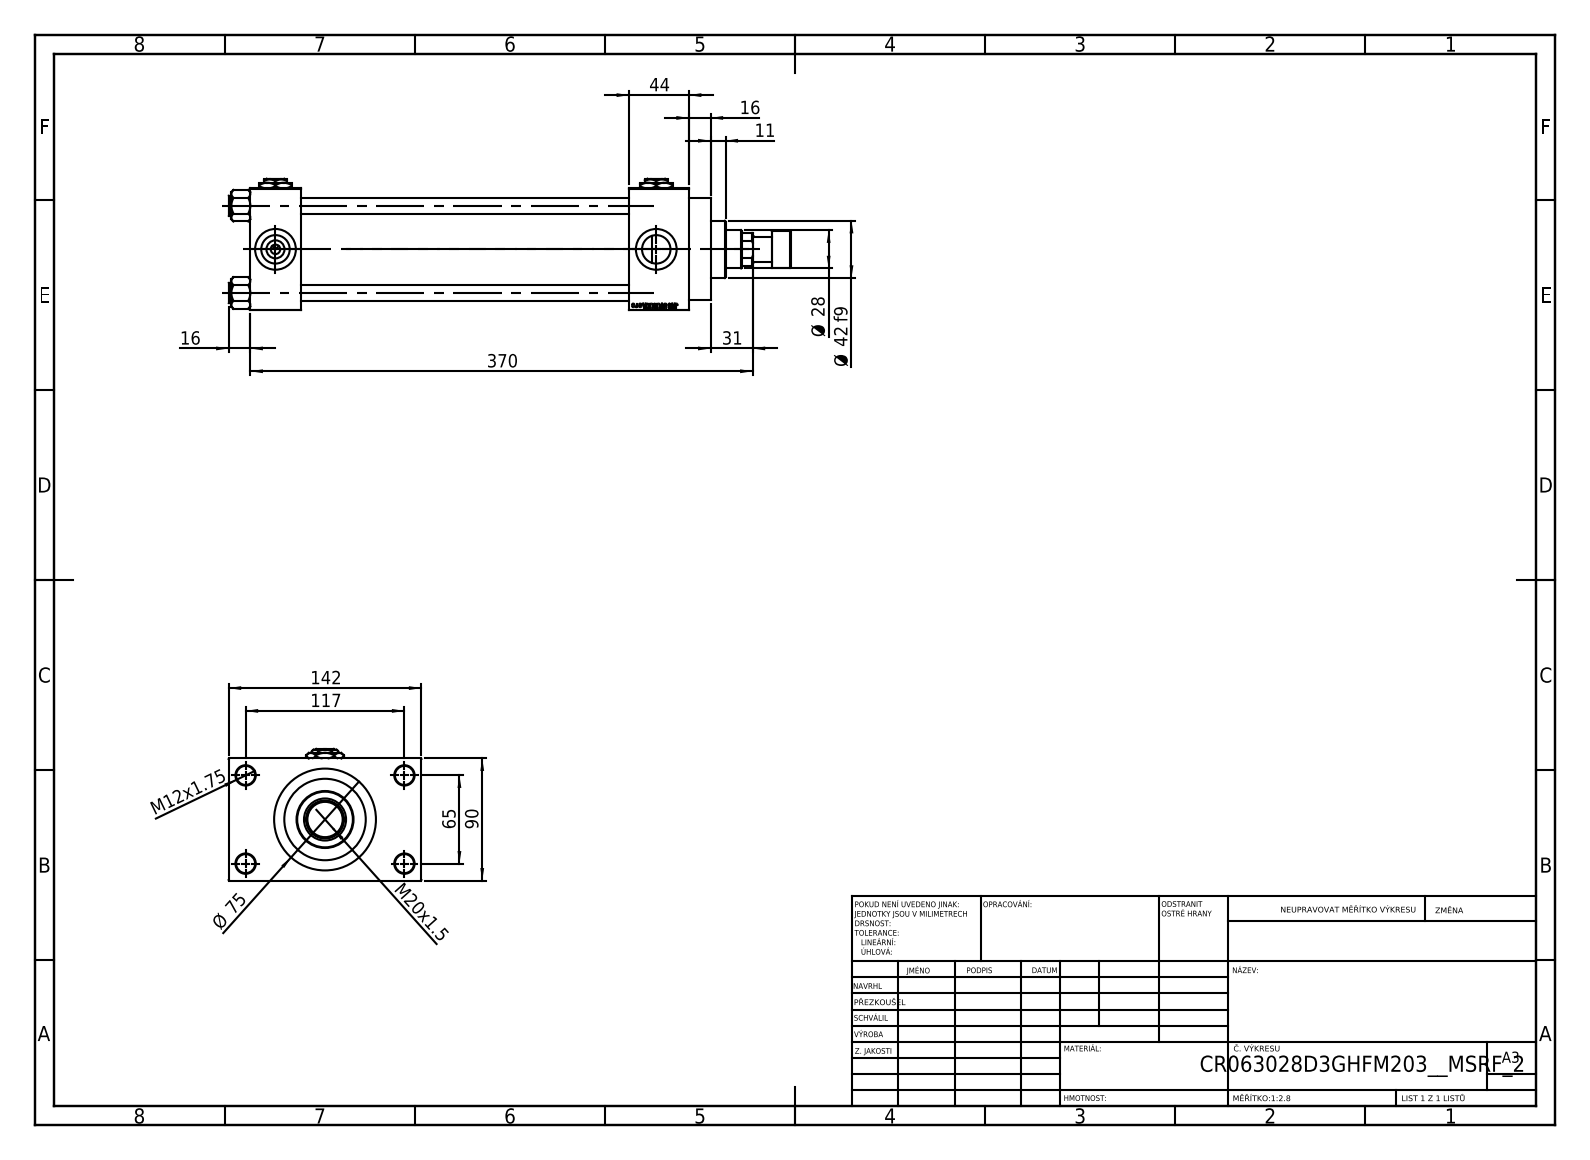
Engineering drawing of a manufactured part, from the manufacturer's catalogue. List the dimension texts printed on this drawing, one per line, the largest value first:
370
142
117
90
Ø 75
65
44
Ø 42 f9
31
Ø 28
M20x1.5
16
16
M12x1.75
11
